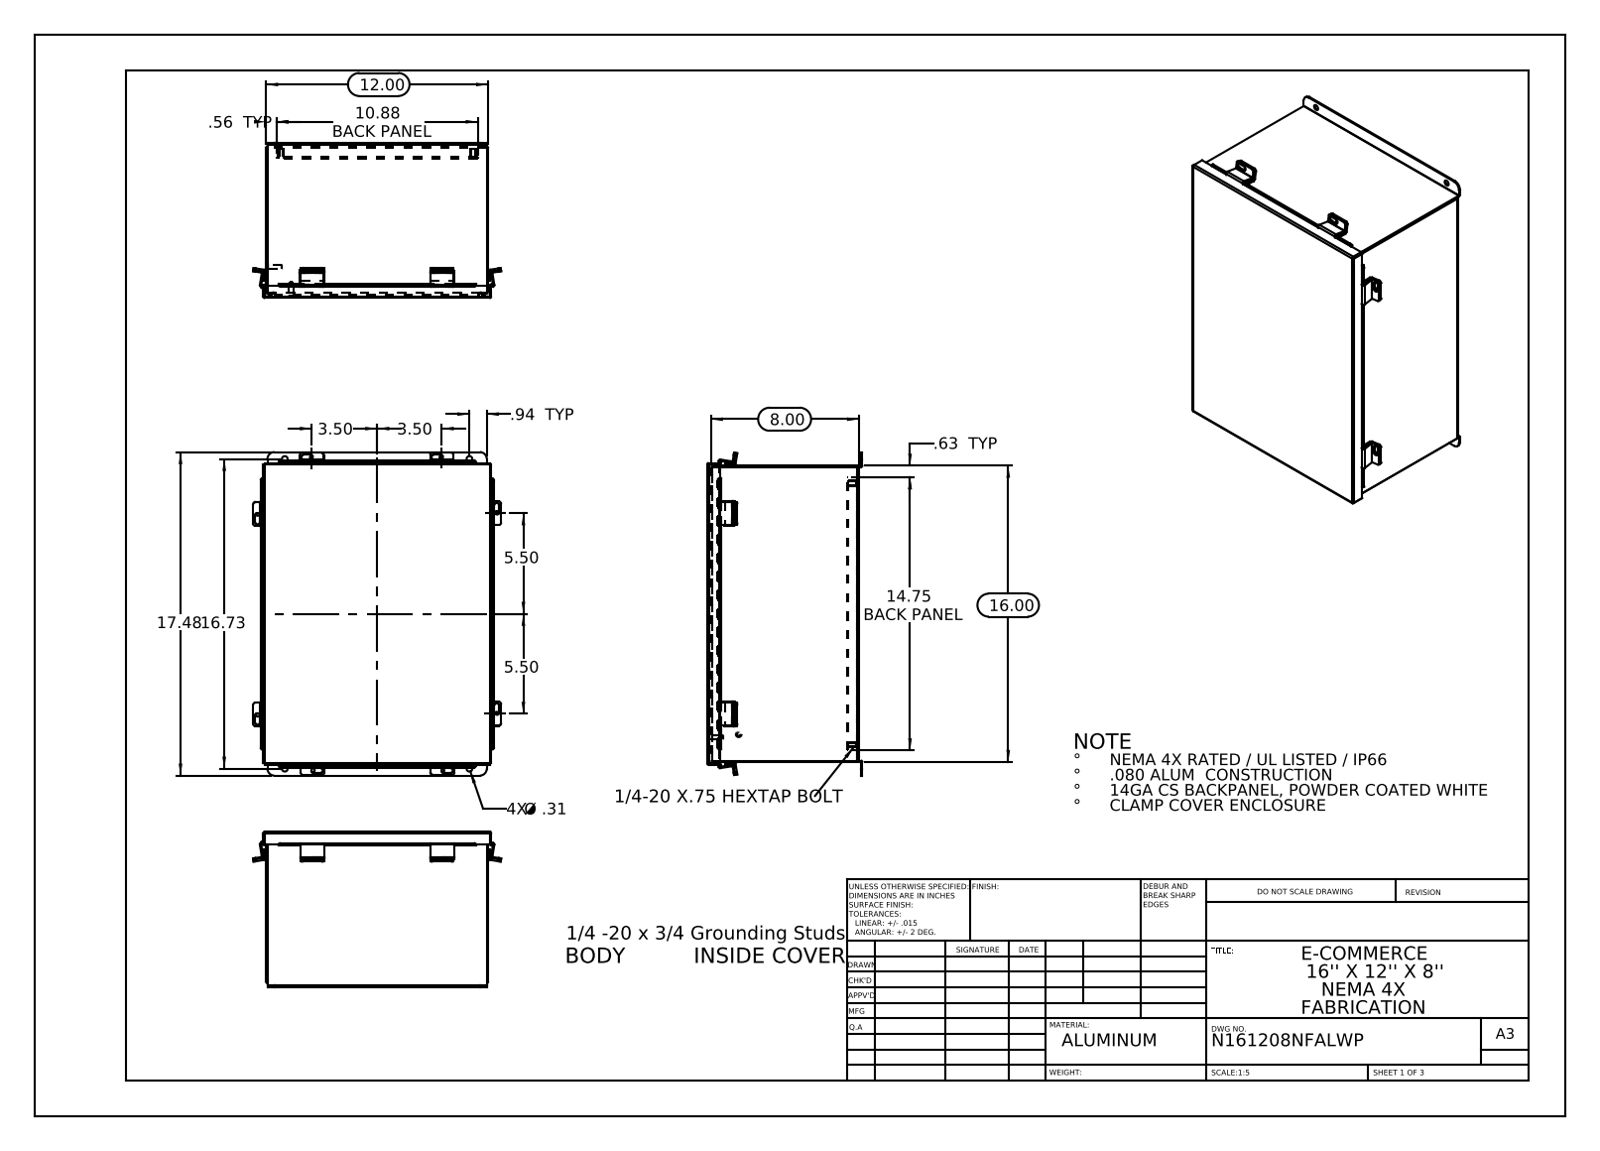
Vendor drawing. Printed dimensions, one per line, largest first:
17.48
16.73
16.00
14.75 BACK PANEL
12.00
10.88 BACK PANEL
8.00
5.50
5.50
3.50
3.50
.94 TYP
.63 TYP
.56 TYP
4X Ø .31
